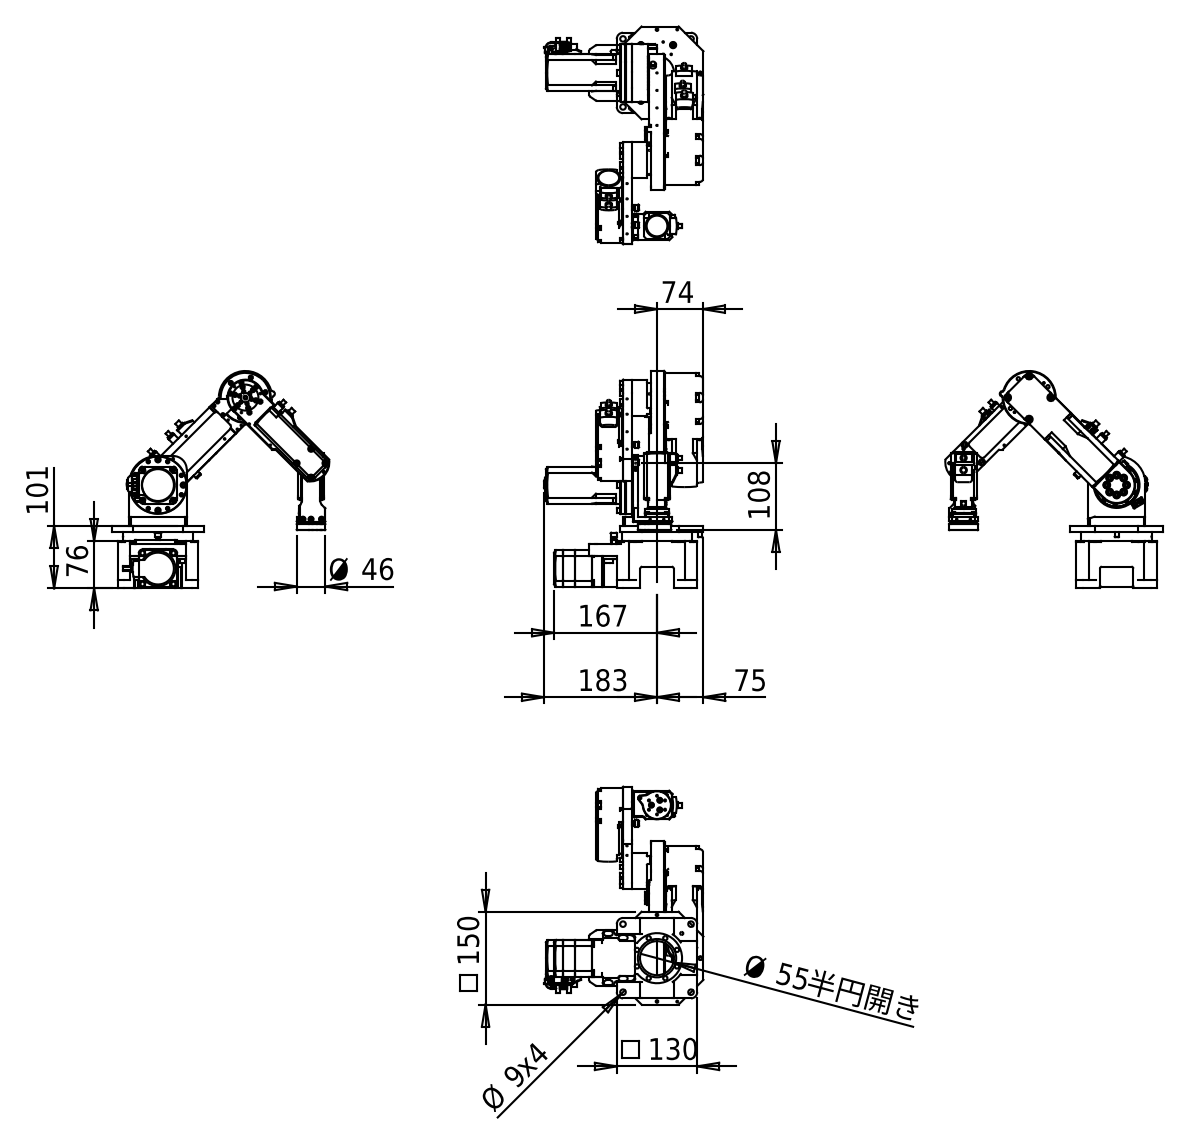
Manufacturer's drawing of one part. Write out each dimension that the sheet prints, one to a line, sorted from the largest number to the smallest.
183
167
150
130
108
101
76
75
74
Ø 55 半円開き
Ø 46
Ø 9 x4
